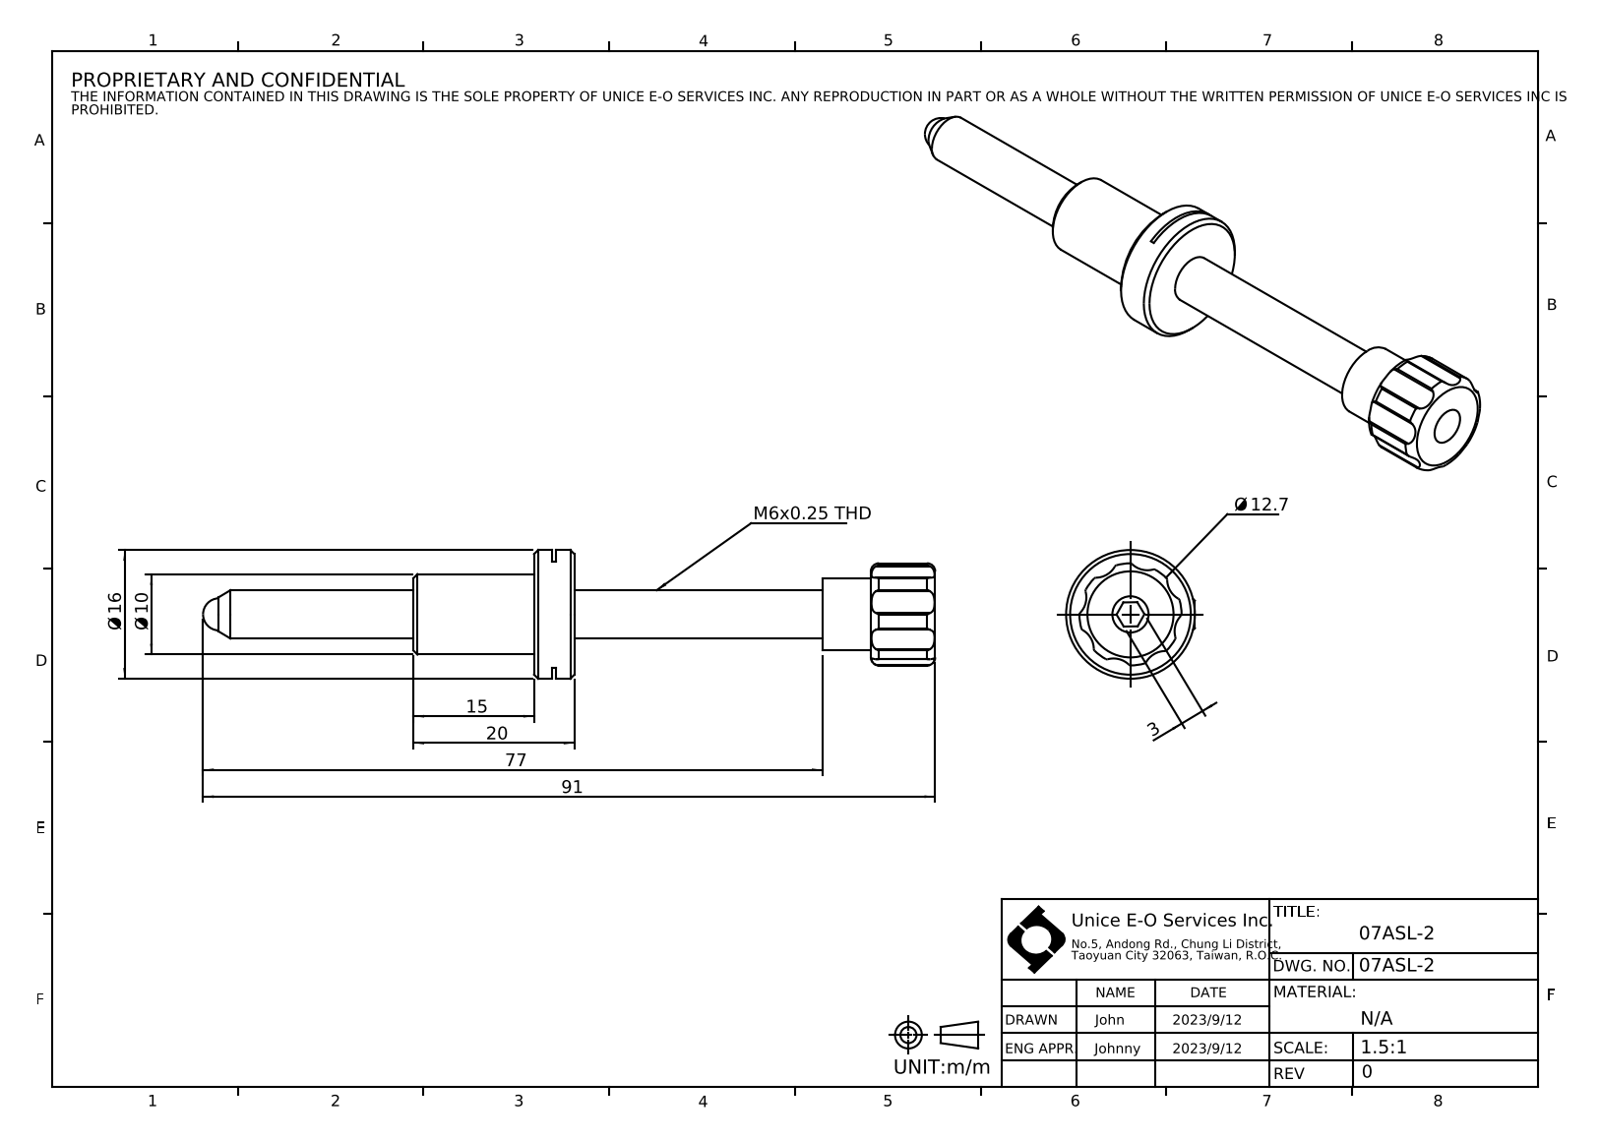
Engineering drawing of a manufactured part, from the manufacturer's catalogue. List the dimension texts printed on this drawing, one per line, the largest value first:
91
77
20
Ø 16
15
Ø 12.7
Ø 10
3
